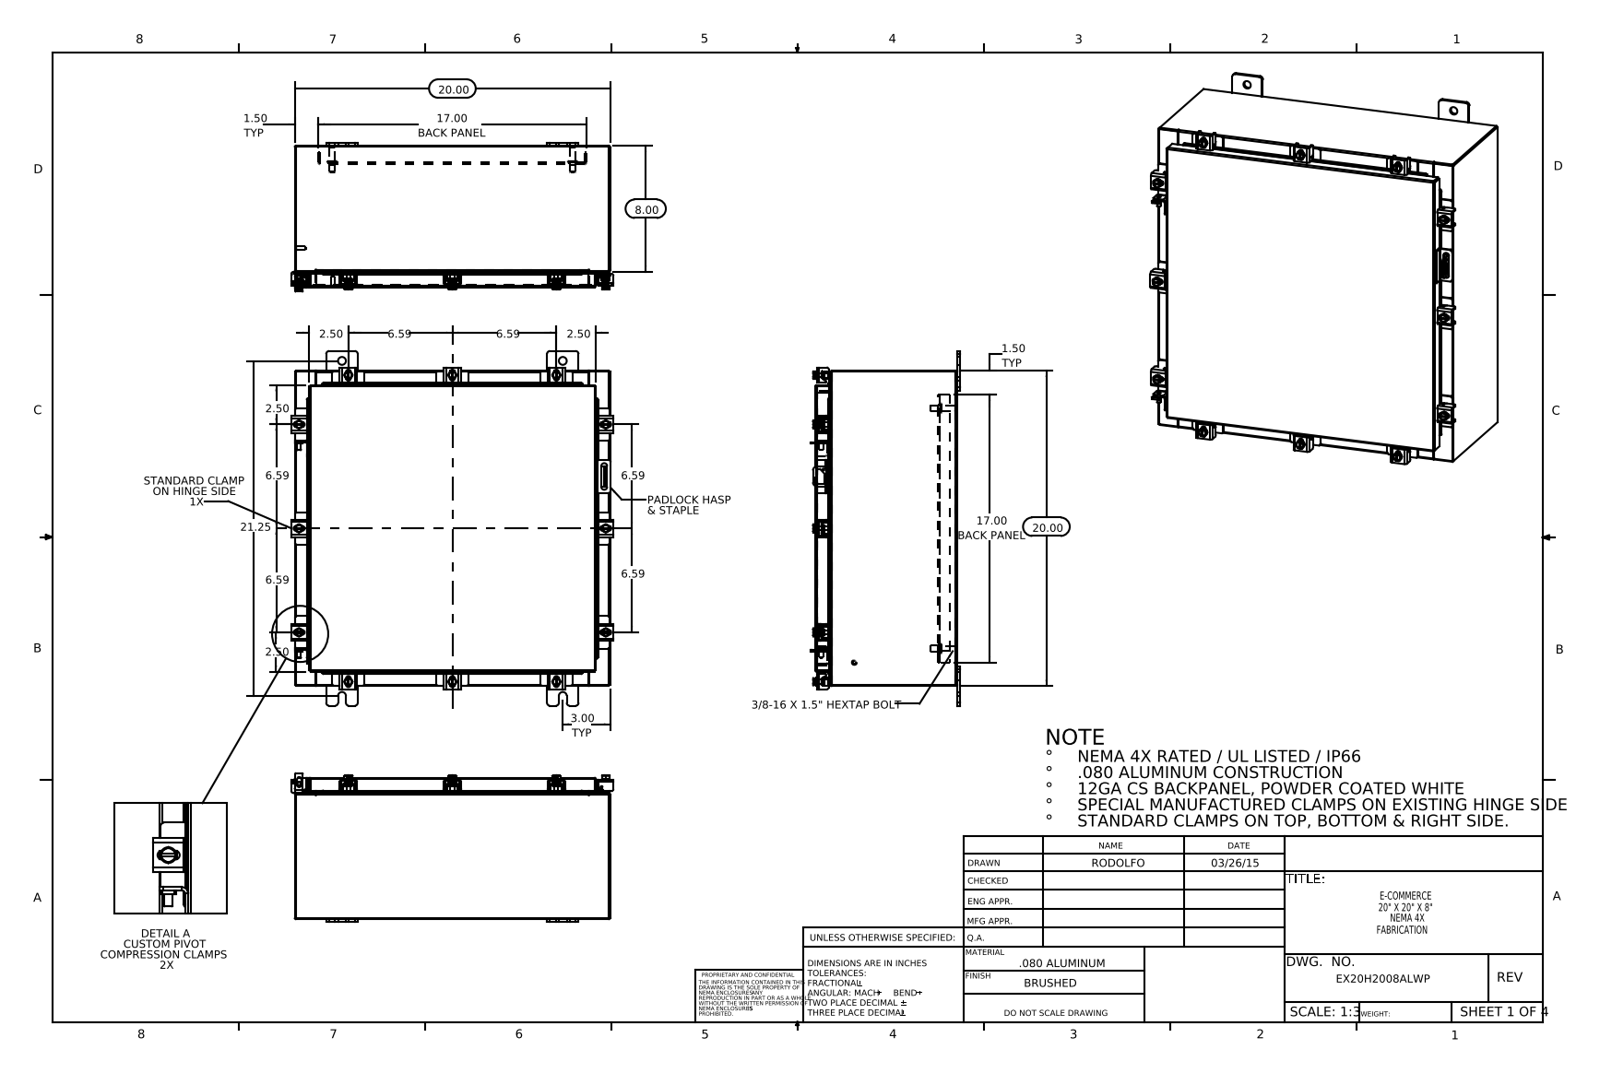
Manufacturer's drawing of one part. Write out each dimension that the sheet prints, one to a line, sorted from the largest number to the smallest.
21.25
20.00
20.00
17.00 BACK PANEL
17.00 BACK PANEL
8.00
6.59
6.59
6.59
6.59
6.59
6.59
3.00 TYP
2.50
2.50
2.50
2.50
1.50 TYP
1.50 TYP
